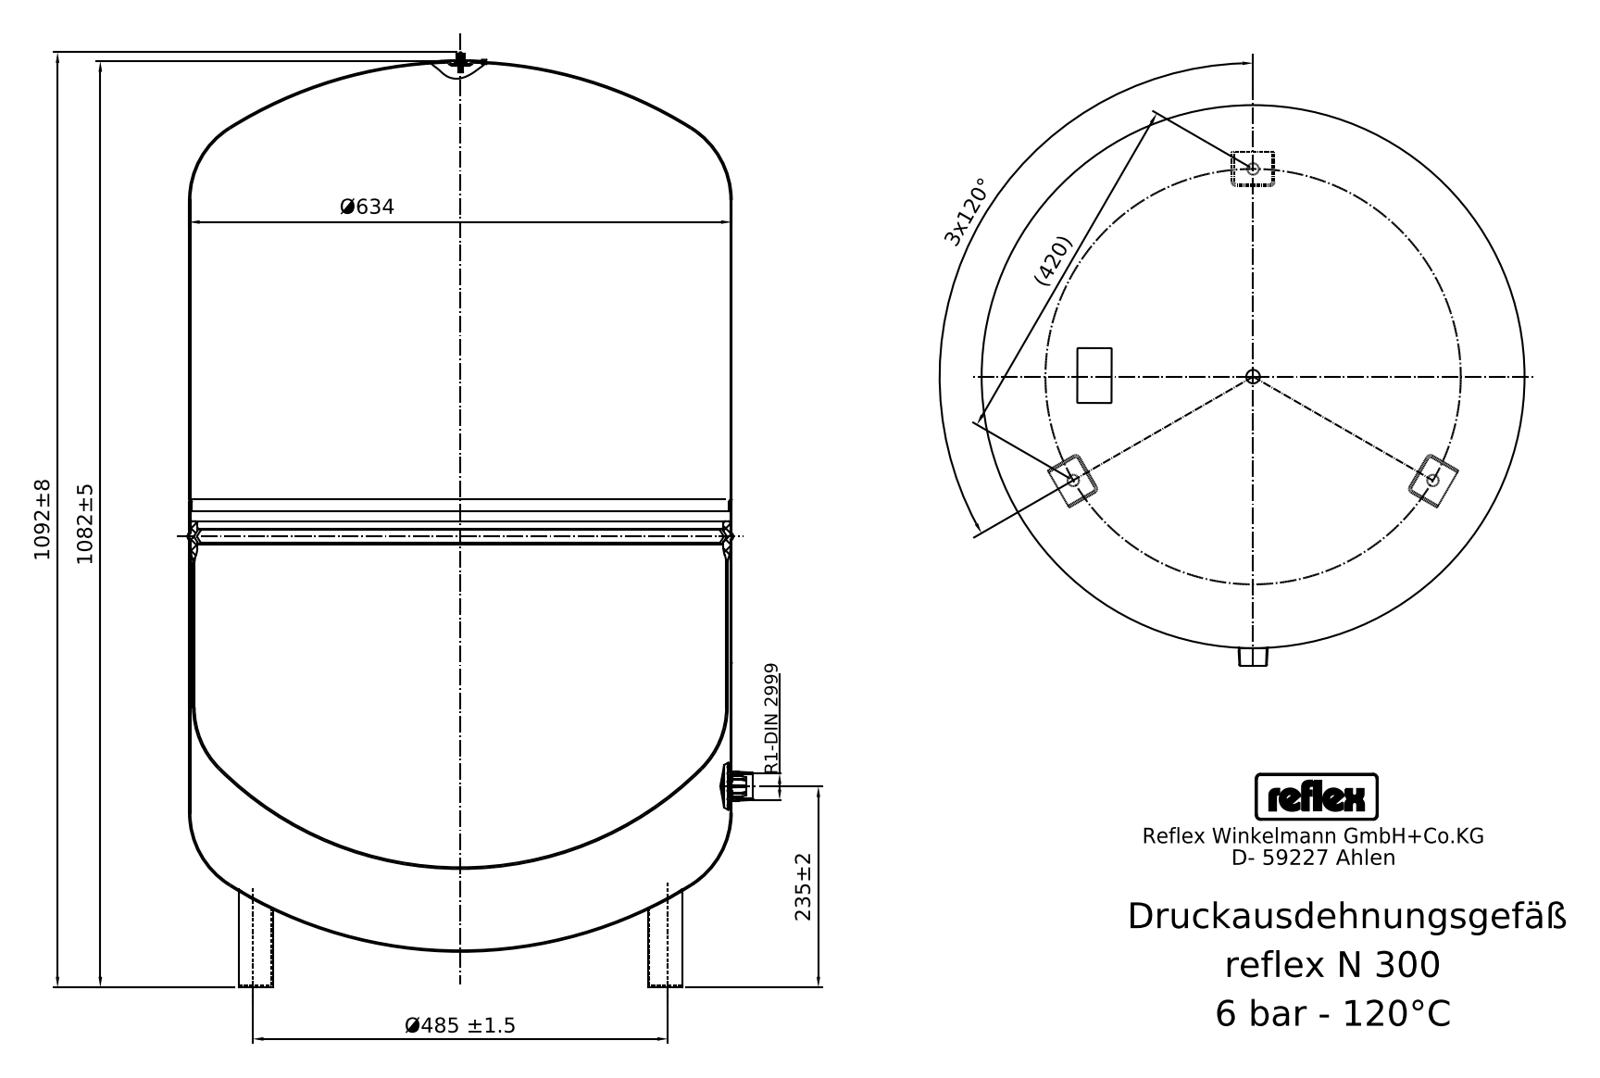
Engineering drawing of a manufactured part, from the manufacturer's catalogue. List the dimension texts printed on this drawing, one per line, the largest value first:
1092±8
1082±5
Ø634
Ø485 ±1.5
(420)
235±2
3x120°
R1-DIN 2999
